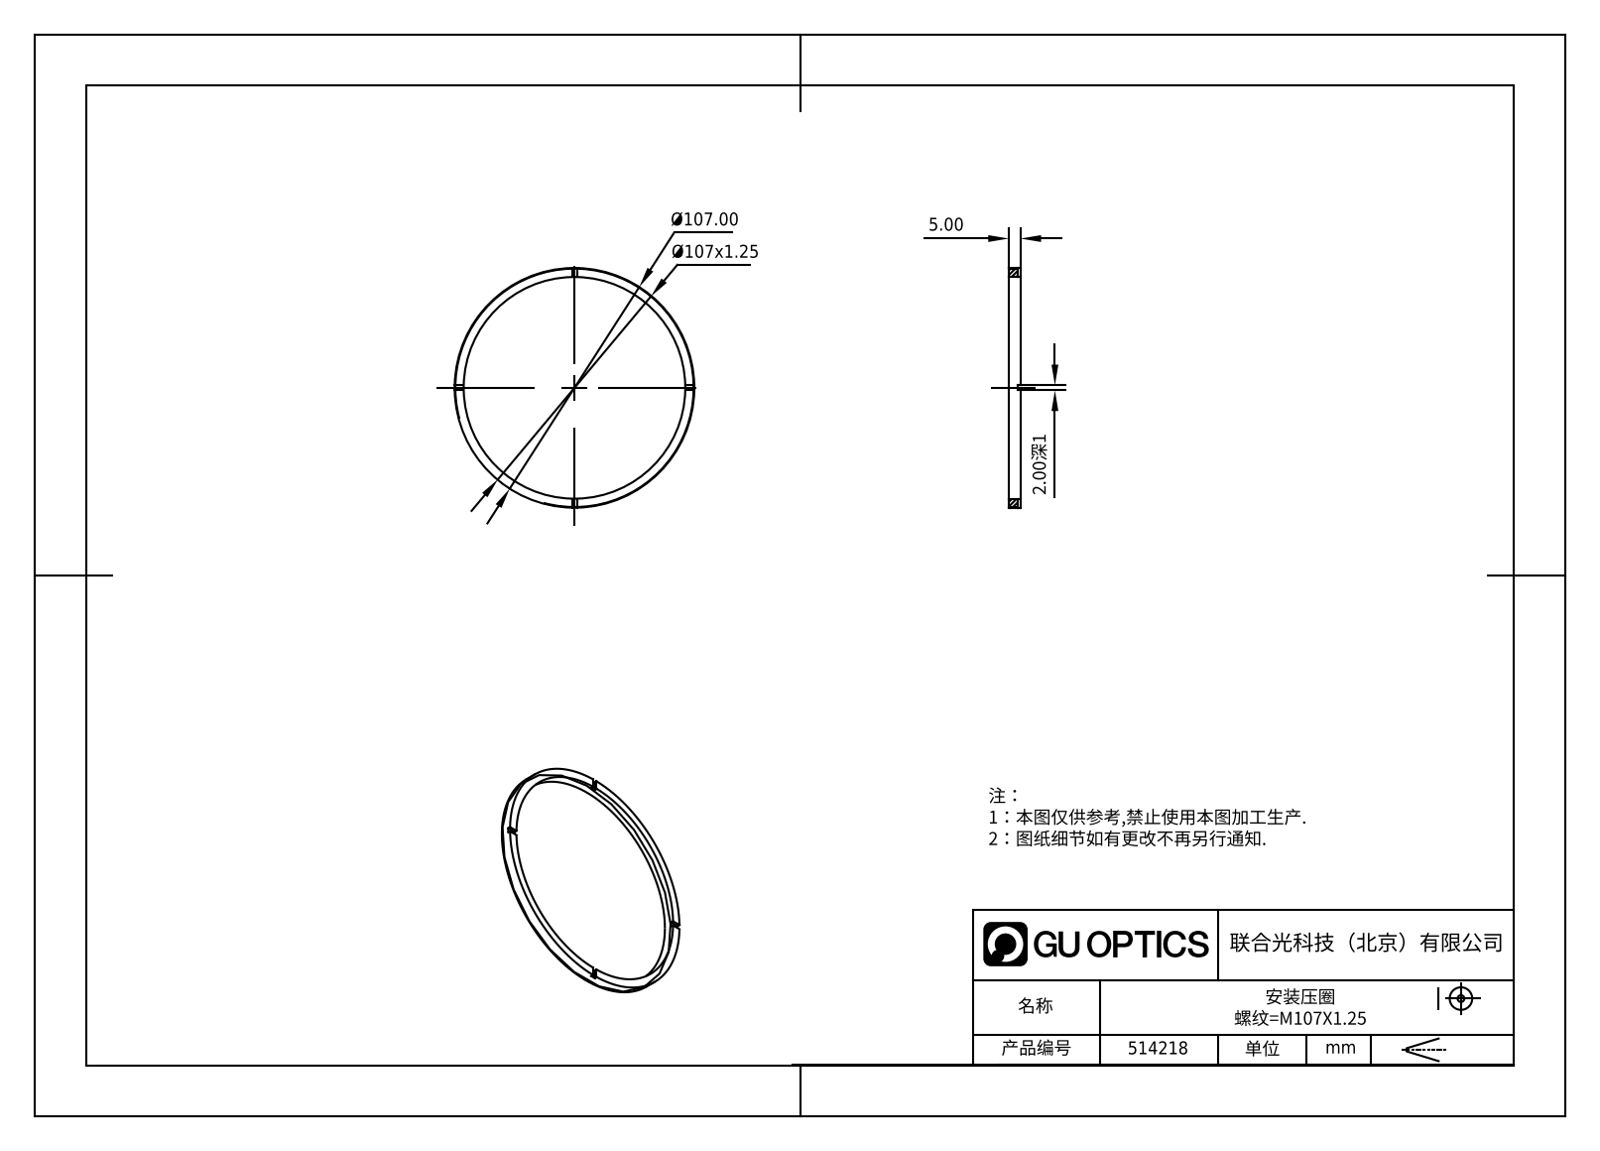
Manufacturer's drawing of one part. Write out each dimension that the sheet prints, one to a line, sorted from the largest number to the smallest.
Ø107.00
Ø107x1.25
5.00
2.00深1
